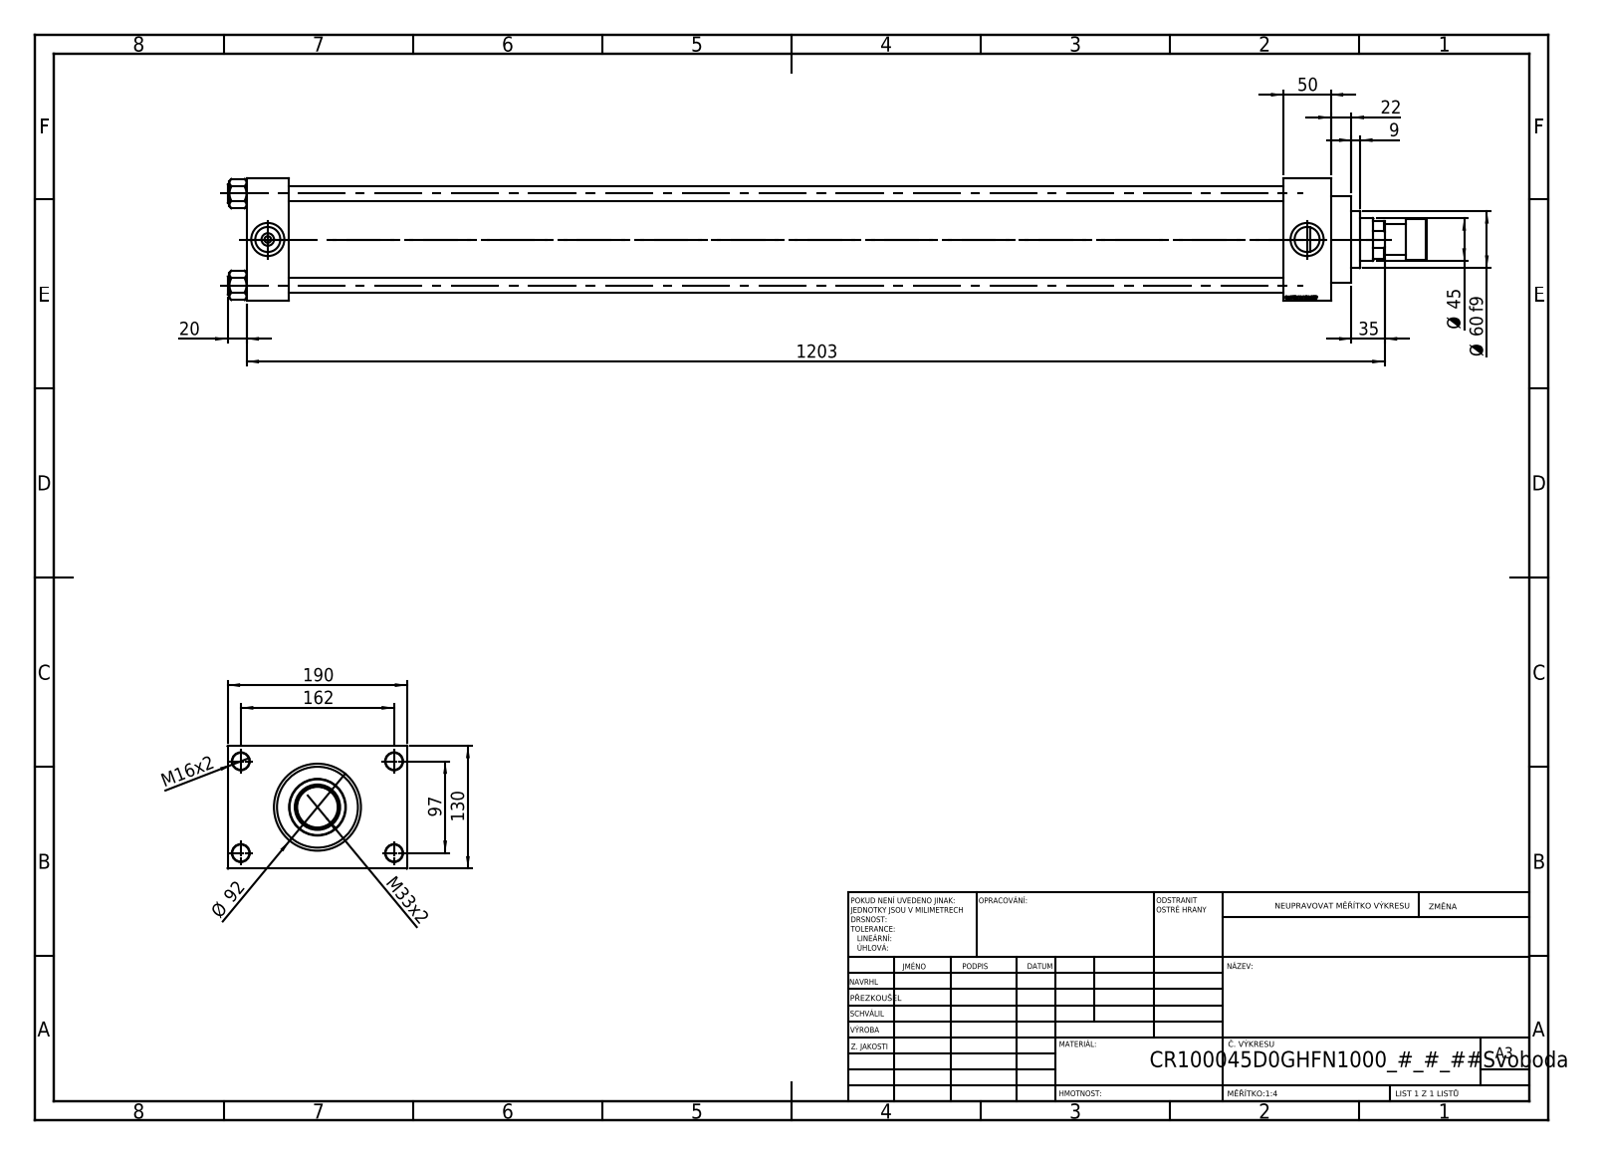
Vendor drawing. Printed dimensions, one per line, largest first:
1203
190
162
130
97
Ø 92
Ø 60 f9
50
Ø 45
35
M33x2
22
20
M16x2
9
